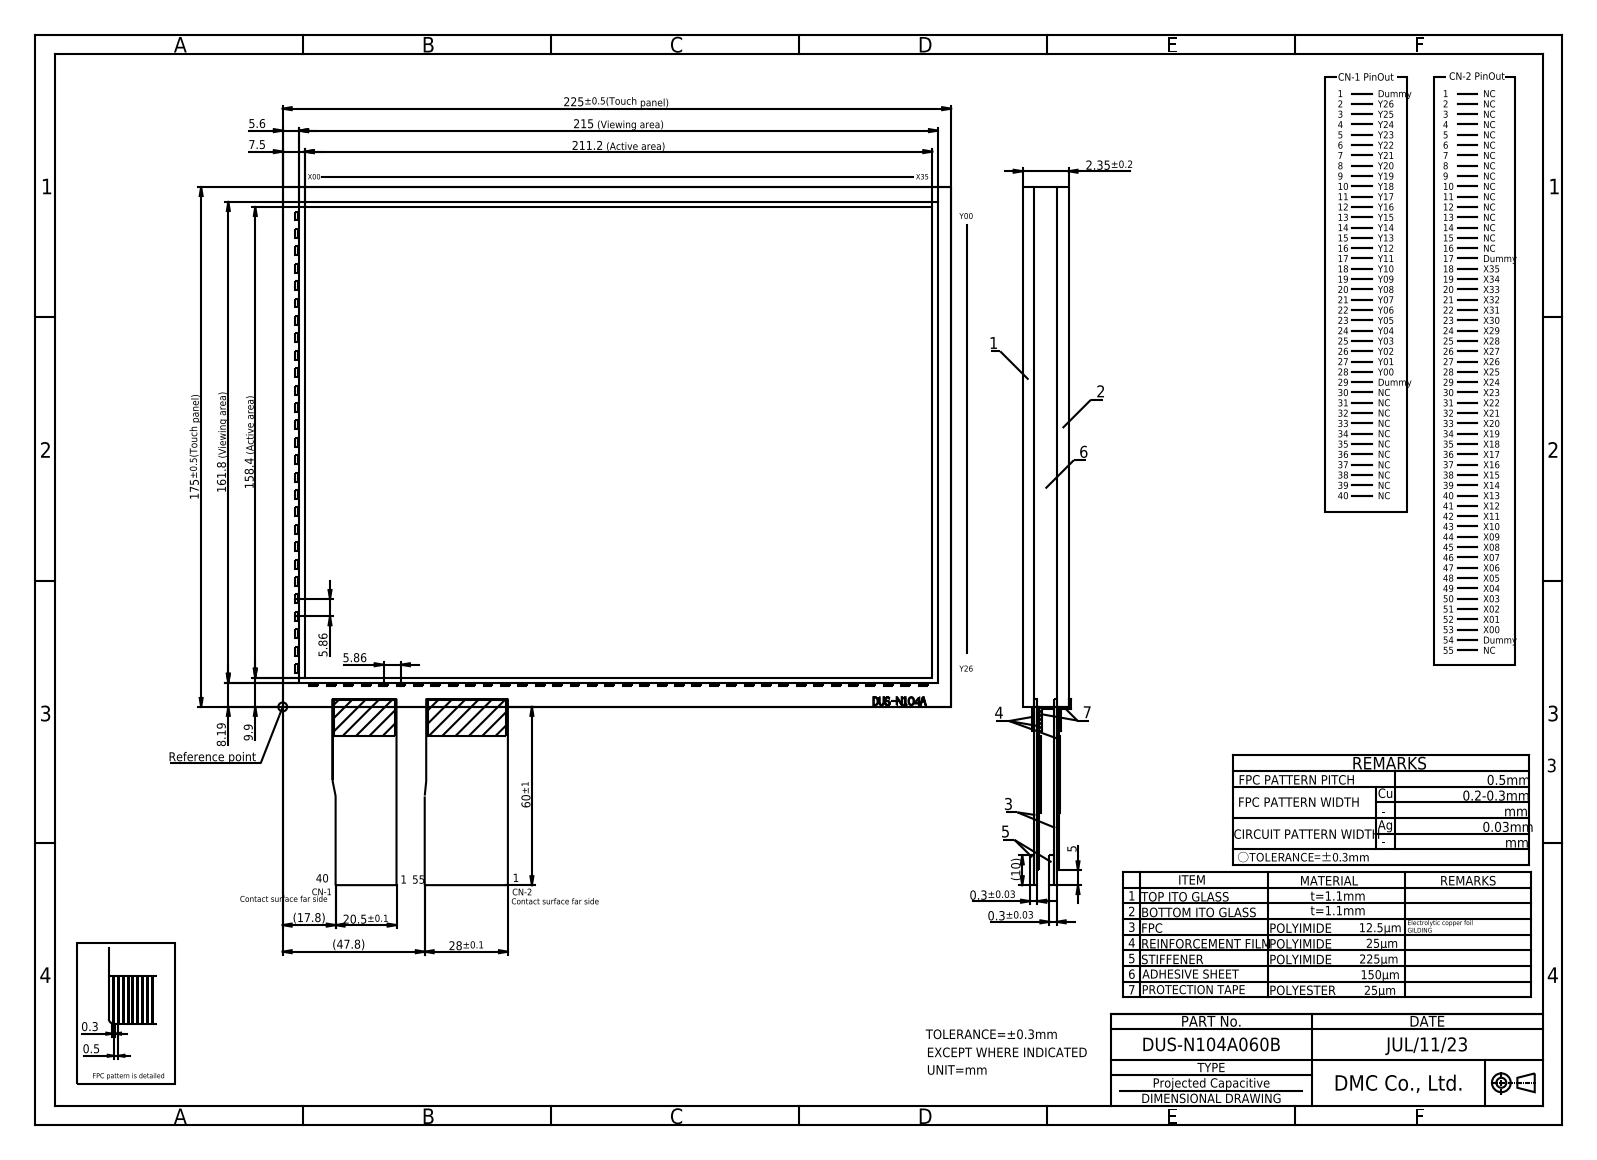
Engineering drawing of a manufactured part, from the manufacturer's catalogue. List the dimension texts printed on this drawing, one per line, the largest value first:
225±0.5(Touch panel)
215 (Viewing area)
211.2 (Active area)
175±0.5(Touch panel)
161.8 (Viewing area)
158.4 (Active area)
60±1
(47.8)
28±0.1
20.5±0.1
(17.8)
(10)
9.9
8.19
7.5
5.86
5.86
5.6
5
2.35±0.2
0.5
0.3
0.3±0.03
0.3±0.03
